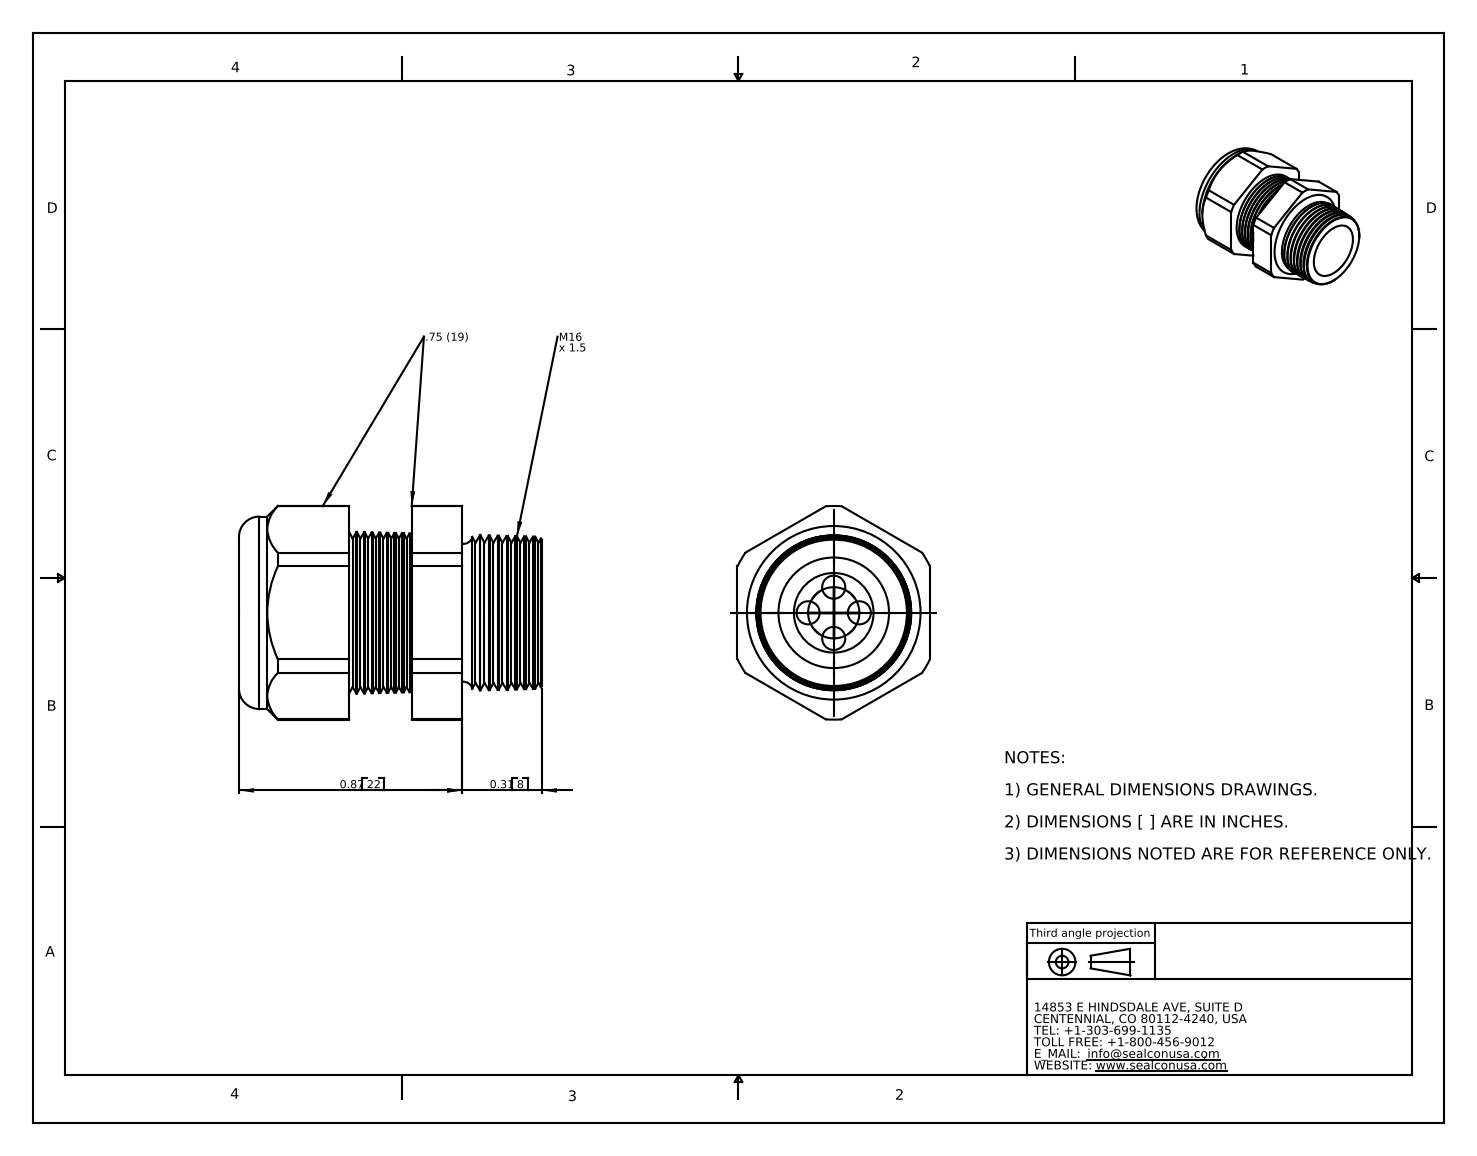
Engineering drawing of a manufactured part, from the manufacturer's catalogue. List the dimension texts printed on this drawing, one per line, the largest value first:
0.87 22
0.31 8
